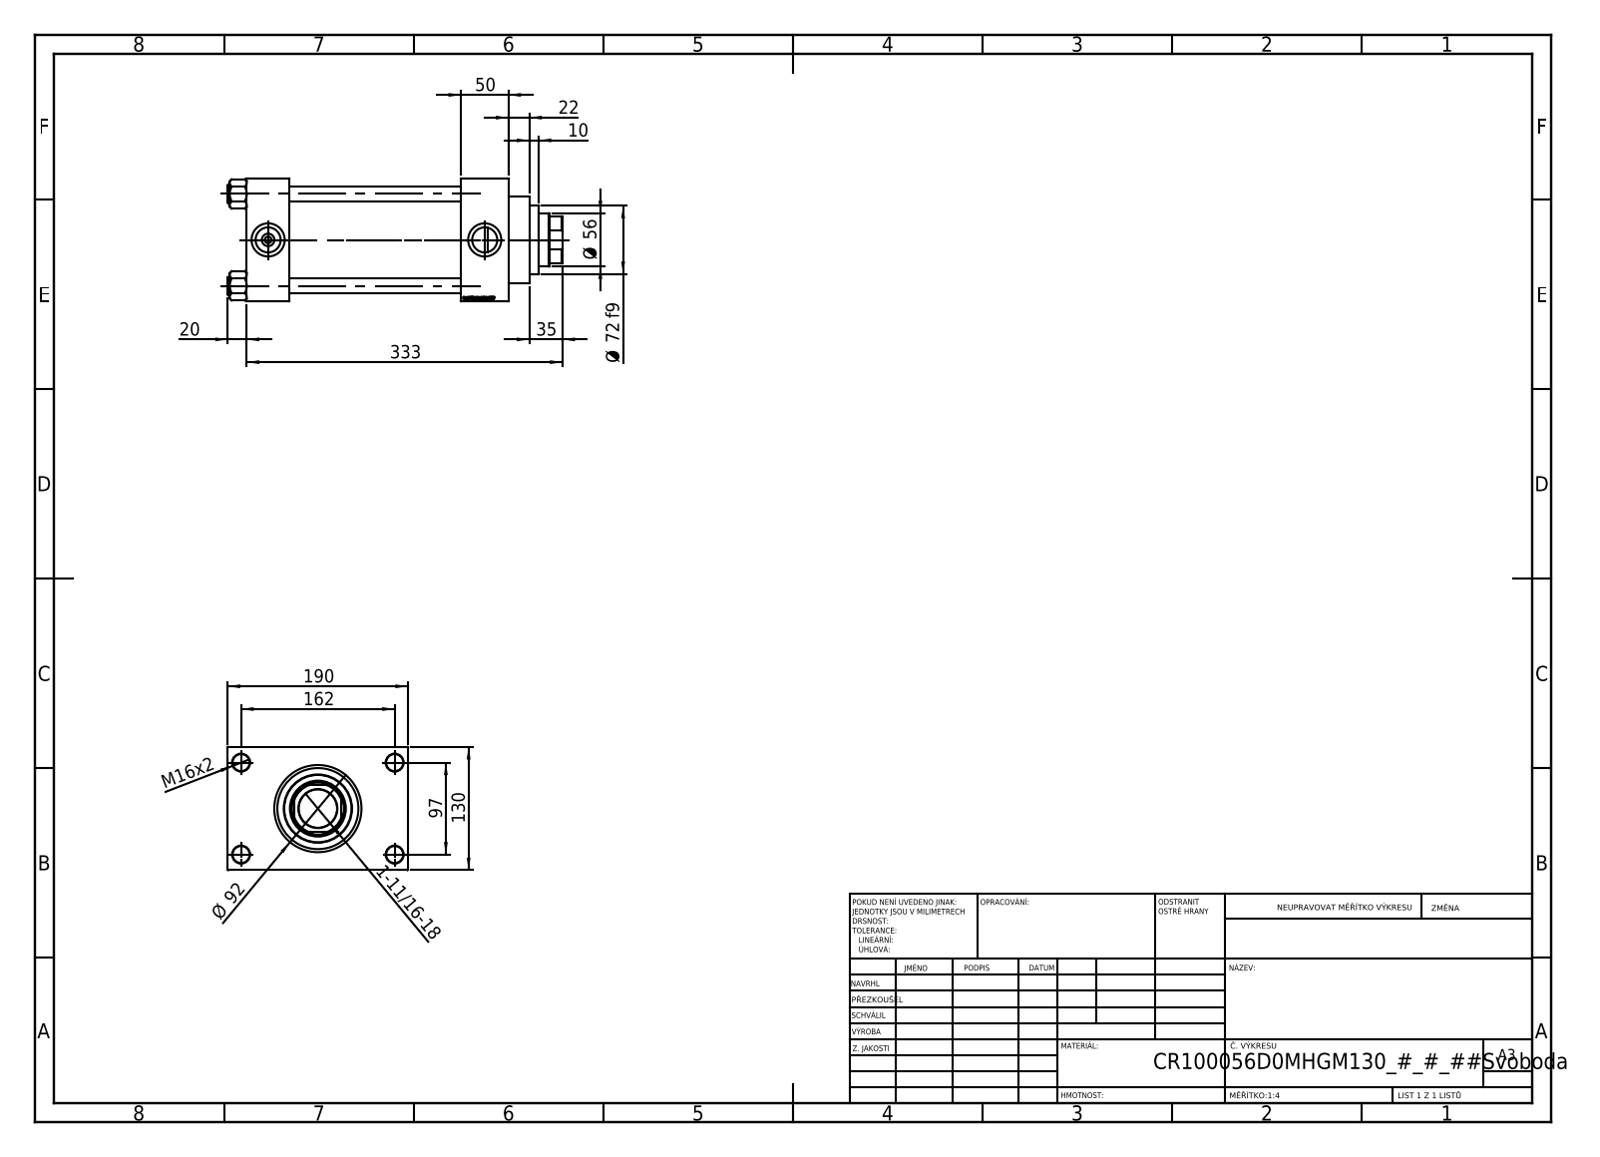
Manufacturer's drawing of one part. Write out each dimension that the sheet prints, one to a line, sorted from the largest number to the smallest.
333
190
162
130
97
Ø 92
Ø 72 f9
Ø 56
50
35
22
20
M16x2
10
1-11/16-18
